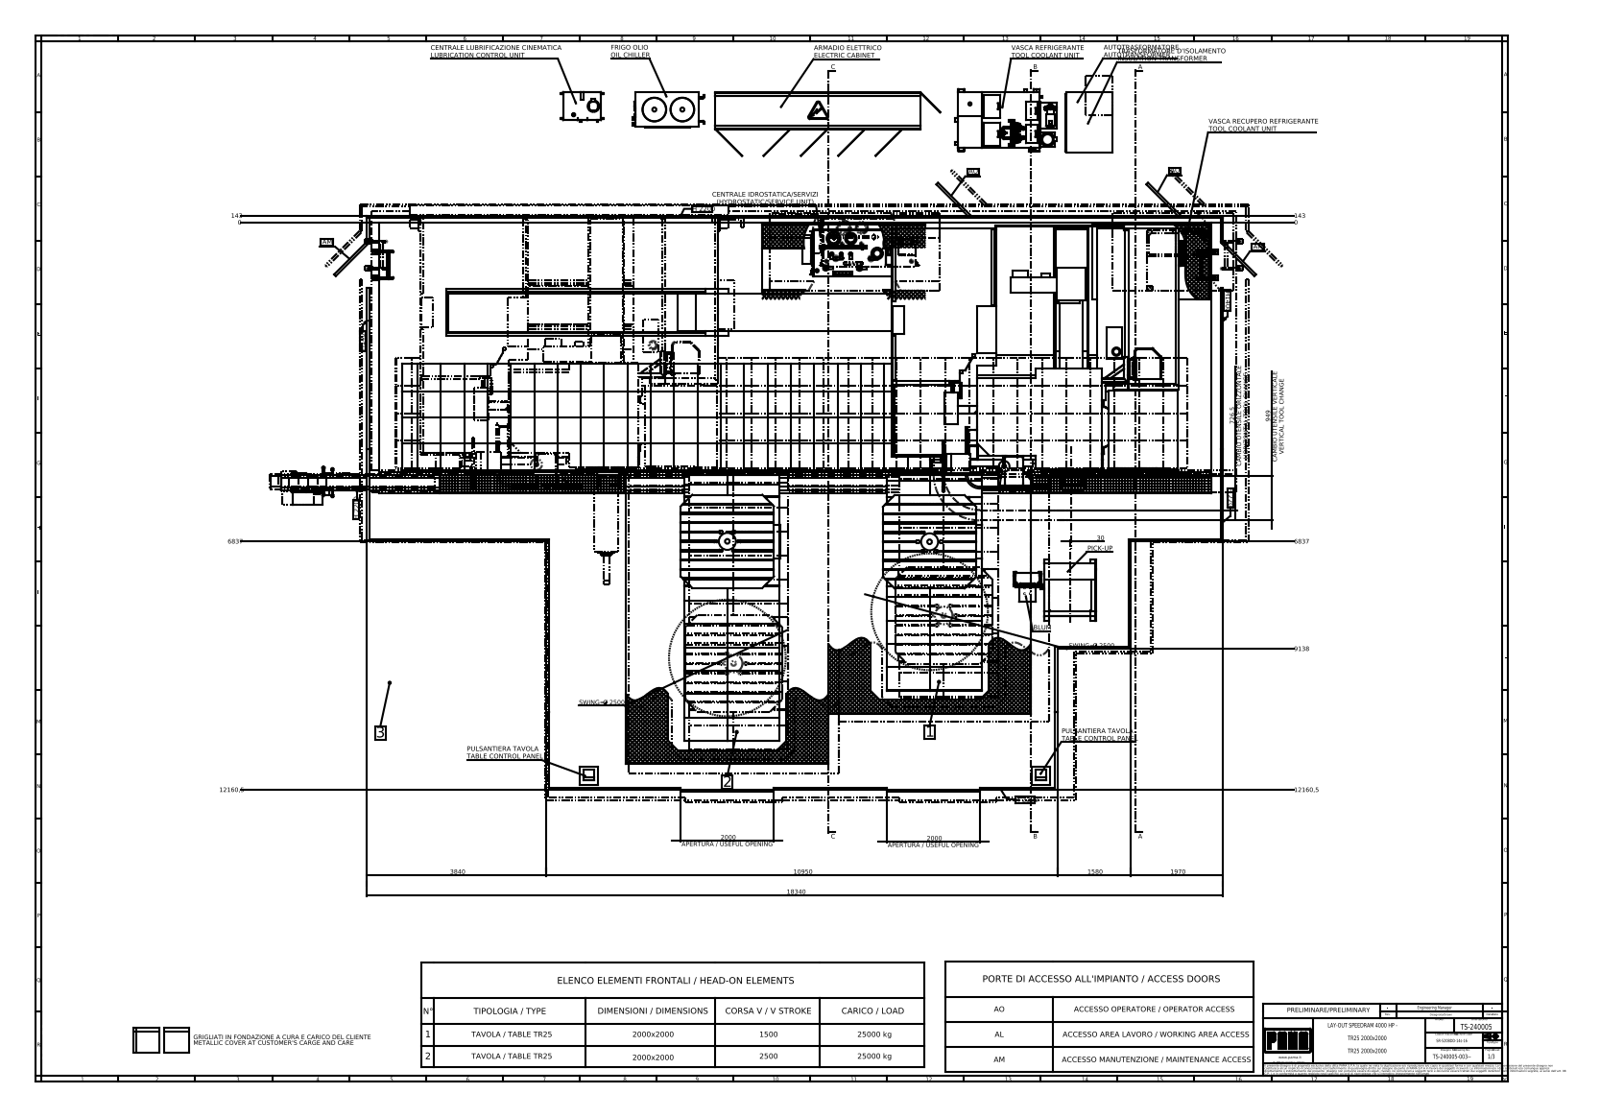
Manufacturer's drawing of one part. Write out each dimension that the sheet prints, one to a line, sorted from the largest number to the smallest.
18340
12160,5
12160,5
10950
9138
6837
6837
3840
SWING= Ø 2500
SWING= Ø 2500
2000 APERTURA / USEFUL OPENING
2000 APERTURA / USEFUL OPENING
1970
1580
949 CAMBIO UTENSILE VERTICALE VERTICAL TOOL CHANGE
726,5 CAMBIO UTENSILE ORIZZONTALE HORIZONTAL TOOL CHANGE
143
143
30
0
0
